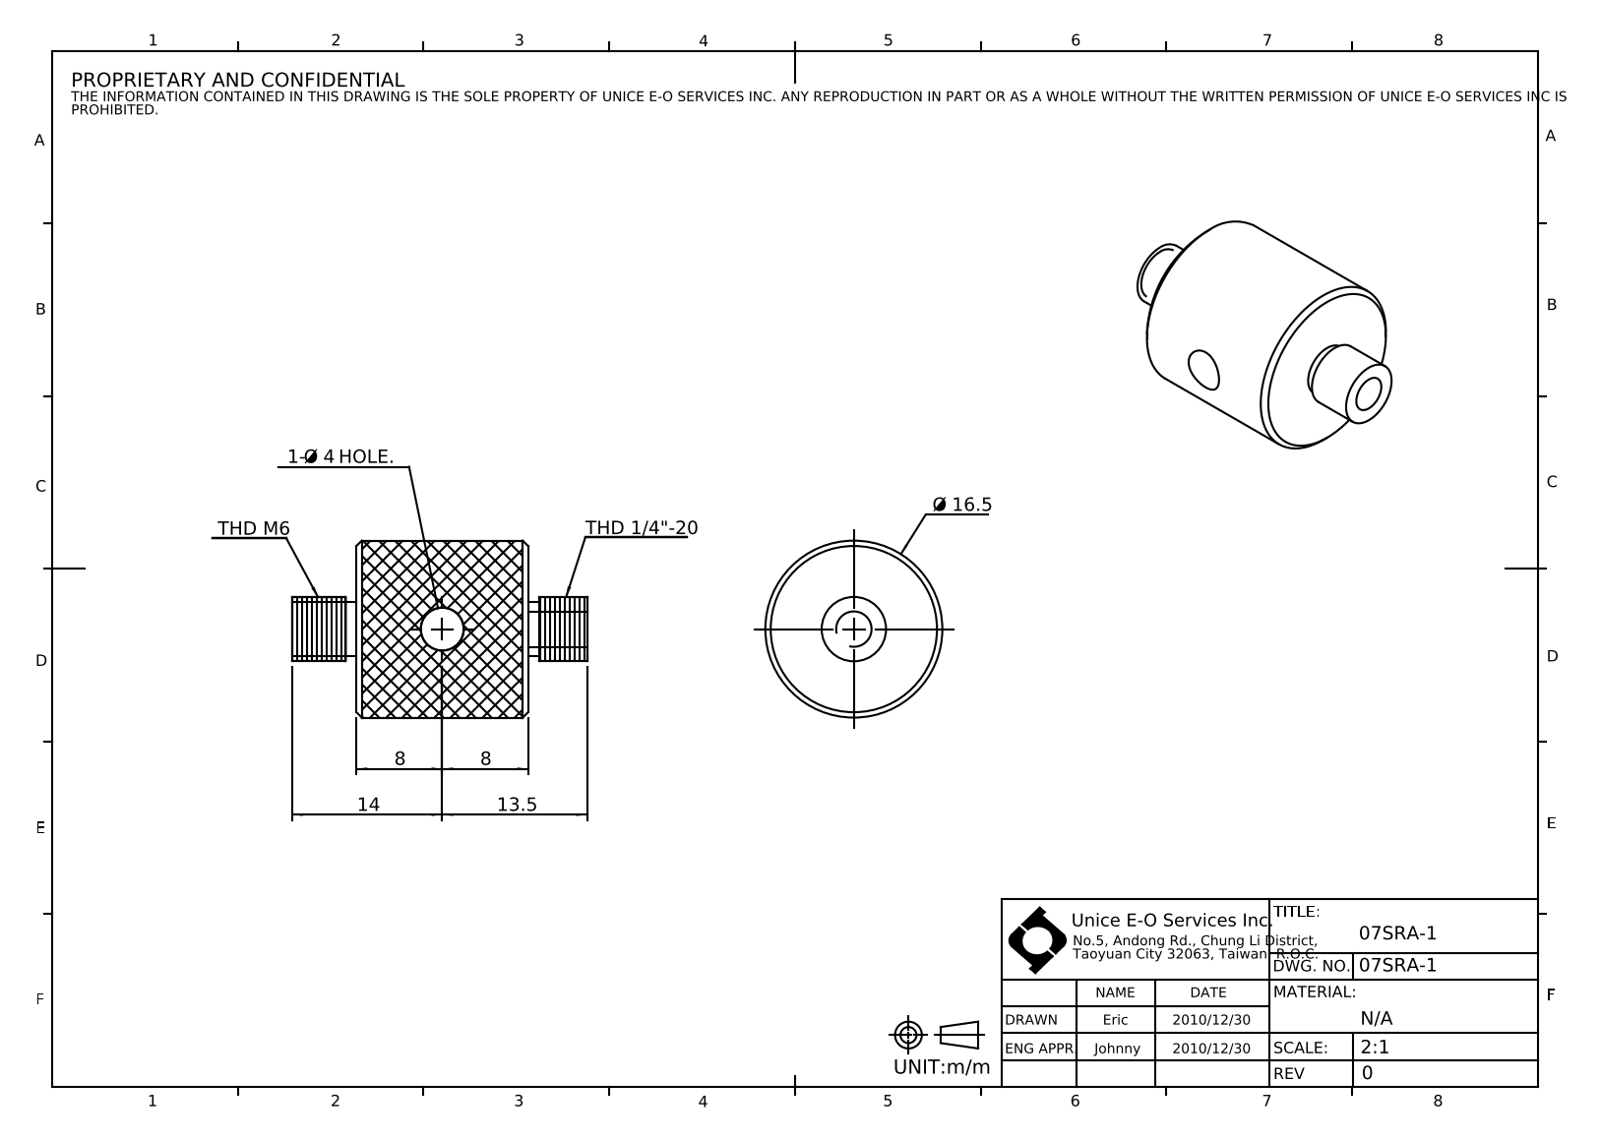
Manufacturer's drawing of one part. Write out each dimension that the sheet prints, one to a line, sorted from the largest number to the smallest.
Ø 16.5
14
13.5
8
8
1- Ø 4 HOLE.
